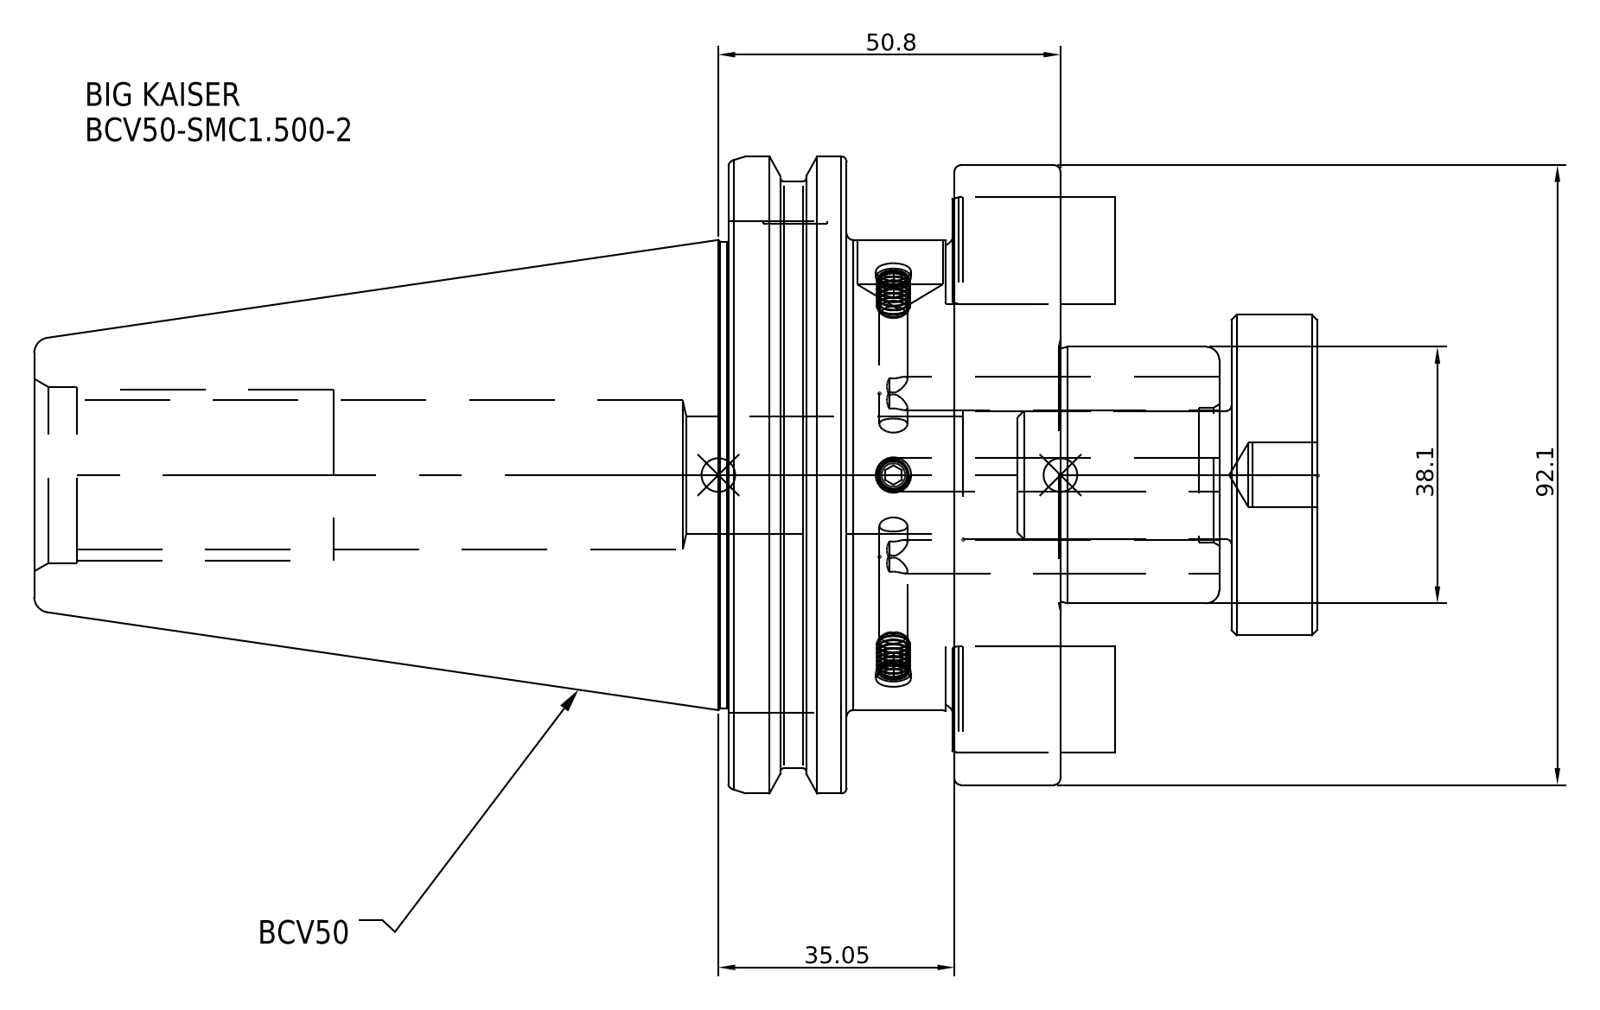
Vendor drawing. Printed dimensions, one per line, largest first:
92.1
50.8
38.1
35.05
